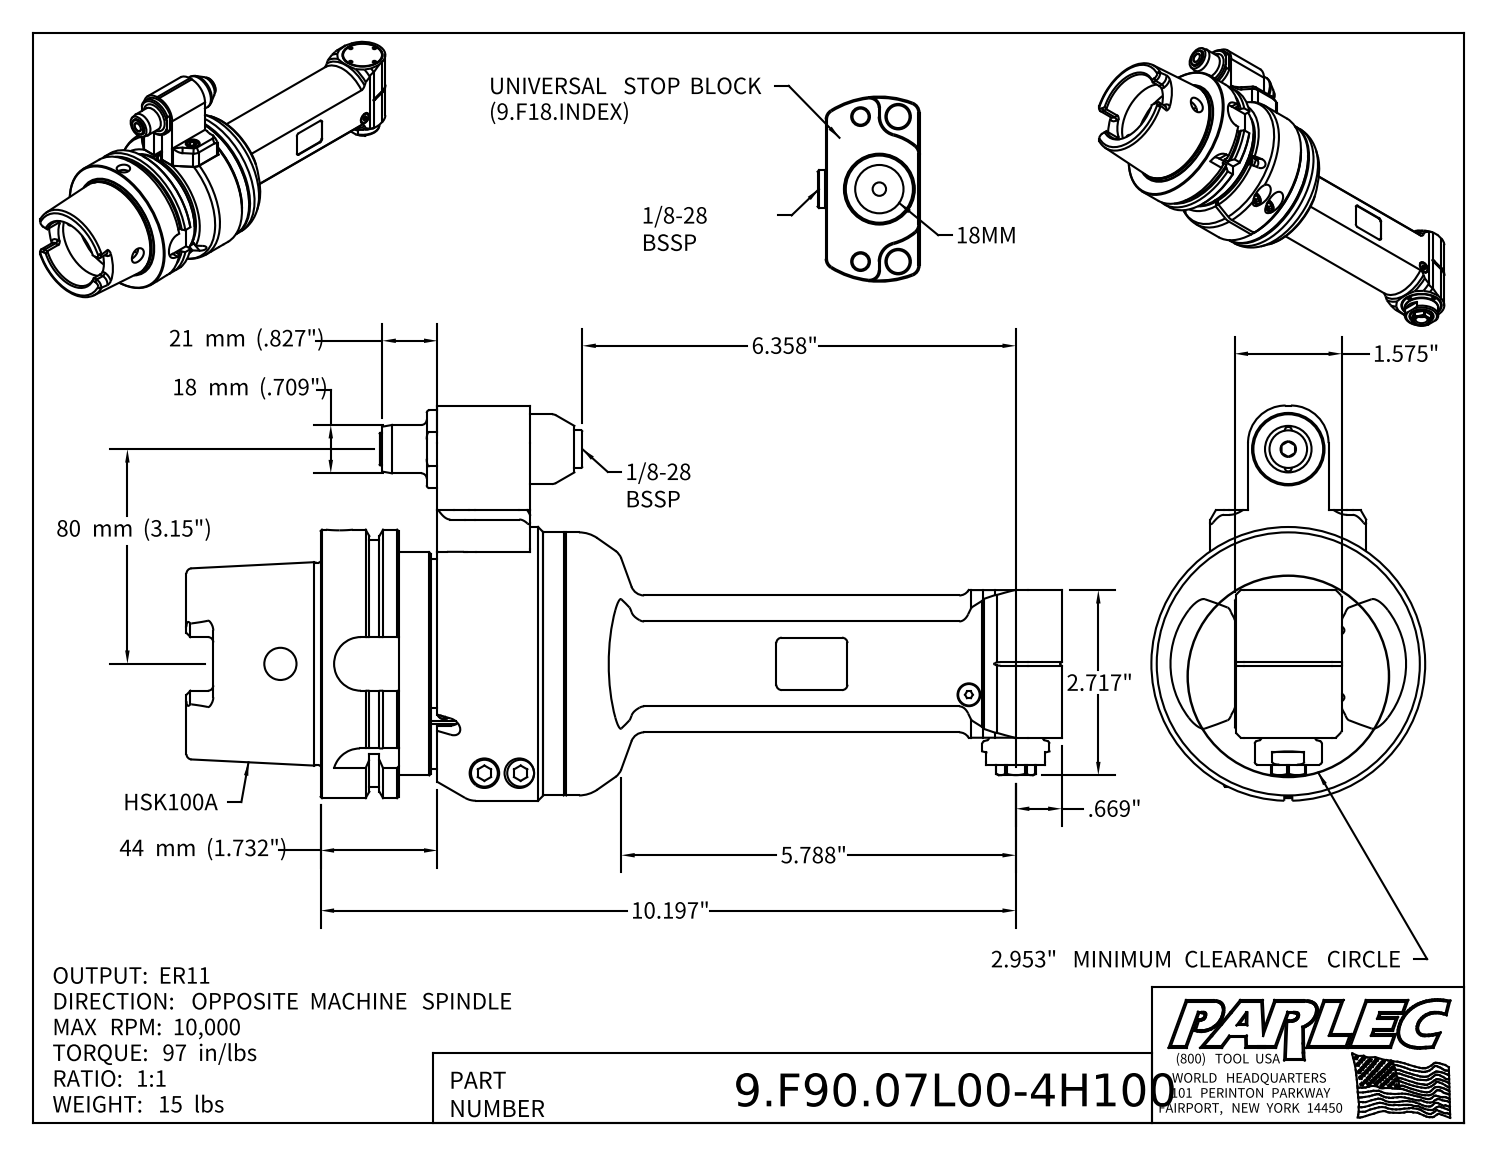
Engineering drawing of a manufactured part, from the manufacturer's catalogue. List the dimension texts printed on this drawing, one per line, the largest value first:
80 mm (3.15")
44 mm (1.732")
21 mm (.827")
18 mm (.709")
10.197"
6.358"
5.788"
2.717"
1.575"
.669"
